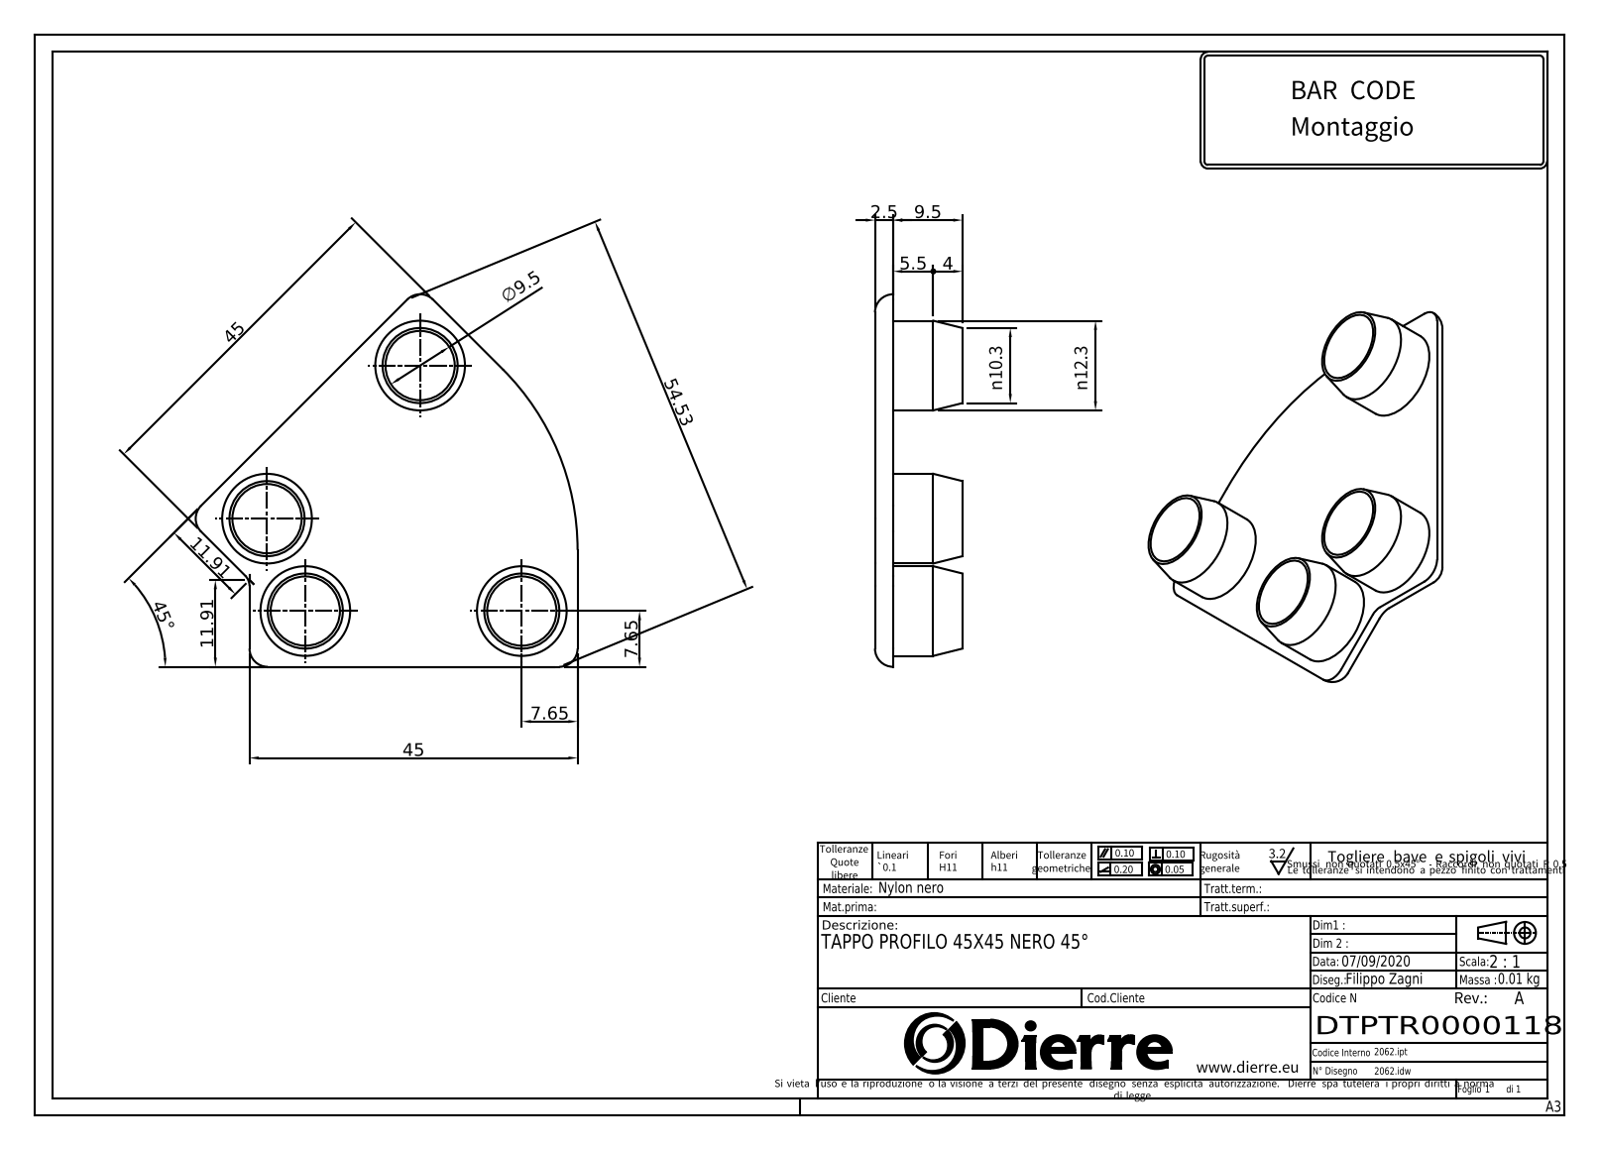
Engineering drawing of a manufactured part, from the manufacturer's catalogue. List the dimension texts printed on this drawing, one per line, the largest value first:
54.53
45
45
45°
n12.3
11.91
11.91
n10.3
9.5
∅9.5
7.65
7.65
5.5
4
2.5
